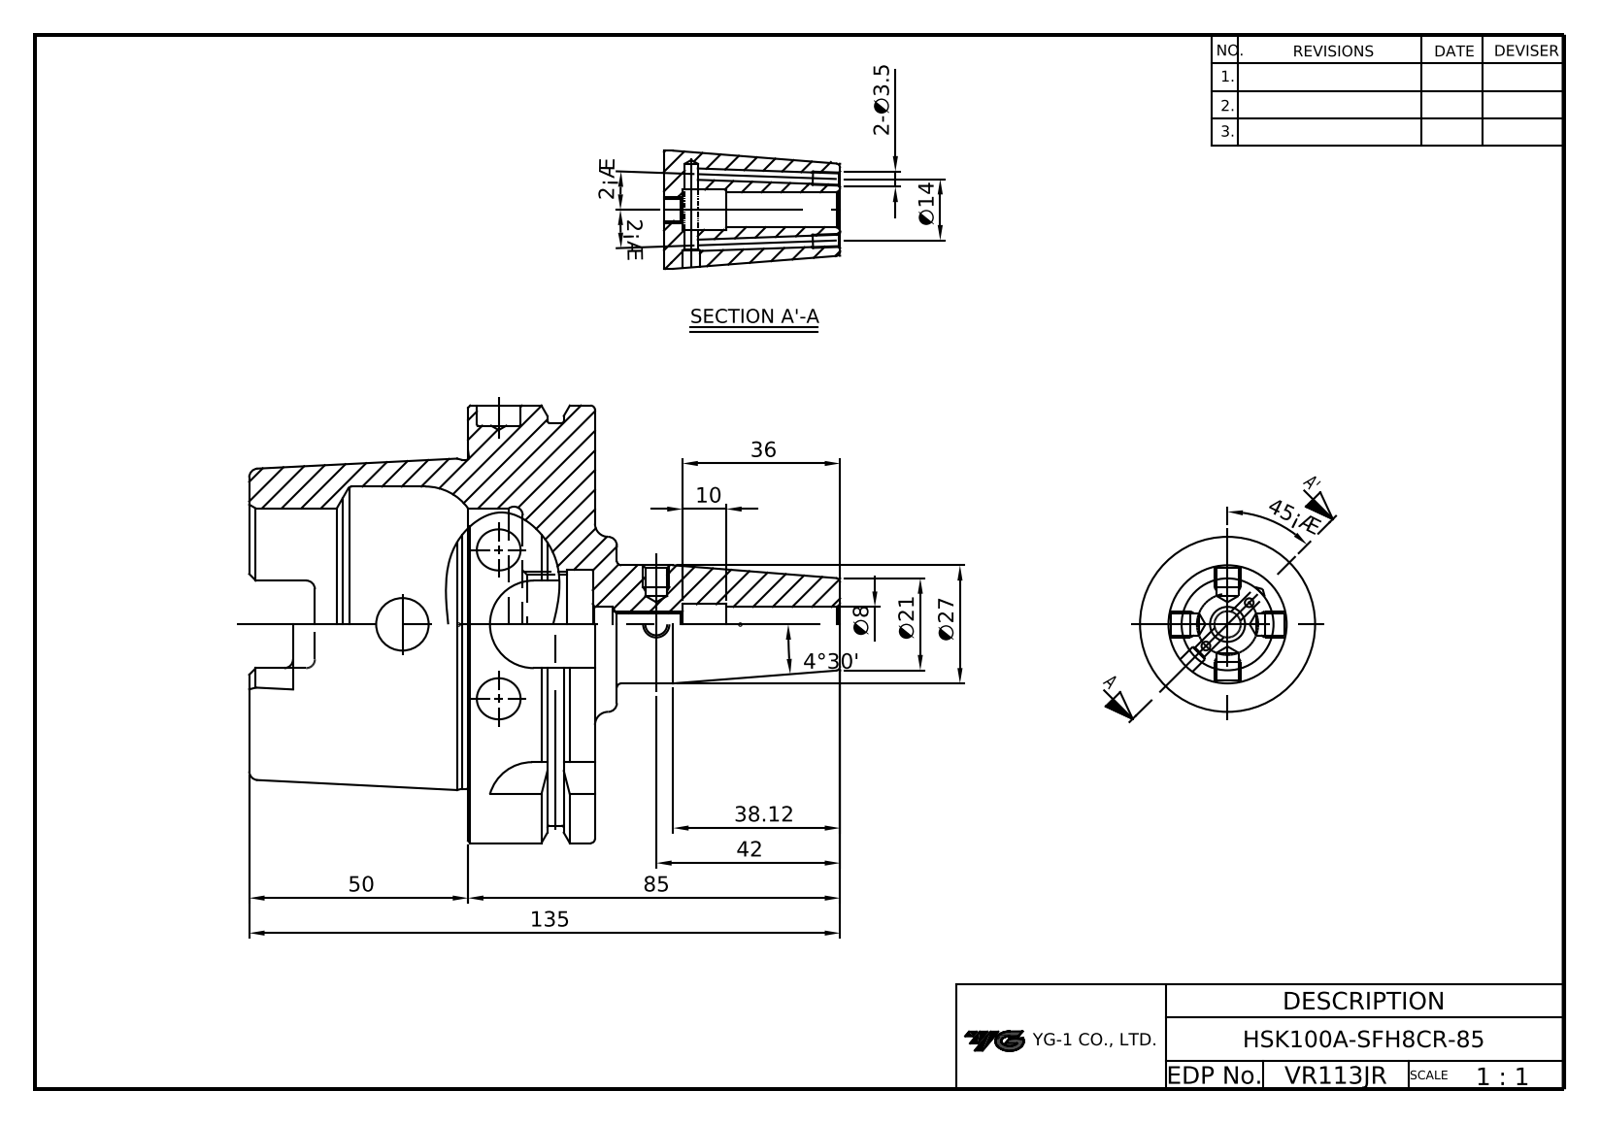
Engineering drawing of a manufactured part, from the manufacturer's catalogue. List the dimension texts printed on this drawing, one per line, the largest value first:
358.00
358.00
225.00
135.00
85.00
50.00
42.00
38.12
36.00
27.00
21.00
14.00
10.00
8.00
4°30'
3.50
